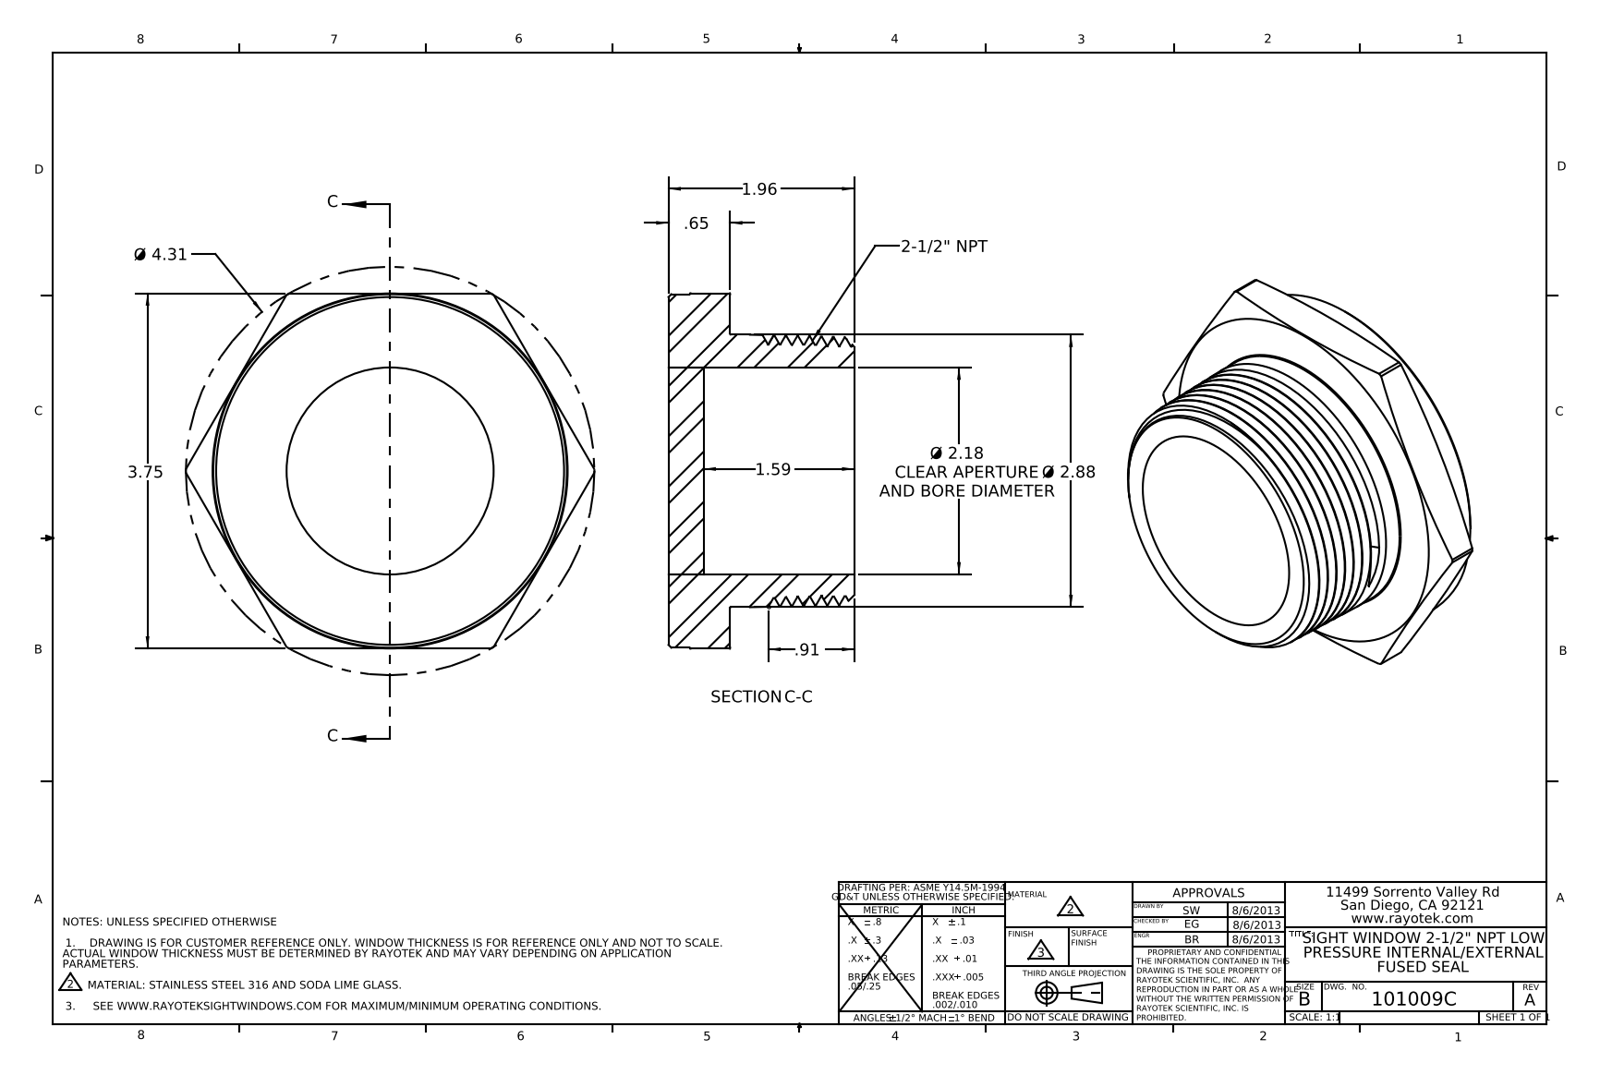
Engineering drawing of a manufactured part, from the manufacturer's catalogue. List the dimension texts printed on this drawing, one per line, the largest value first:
Ø 4.31
3.75
Ø 2.88
Ø 2.18 CLEAR APERTURE AND BORE DIAMETER
1.96
1.59
.91
.65
